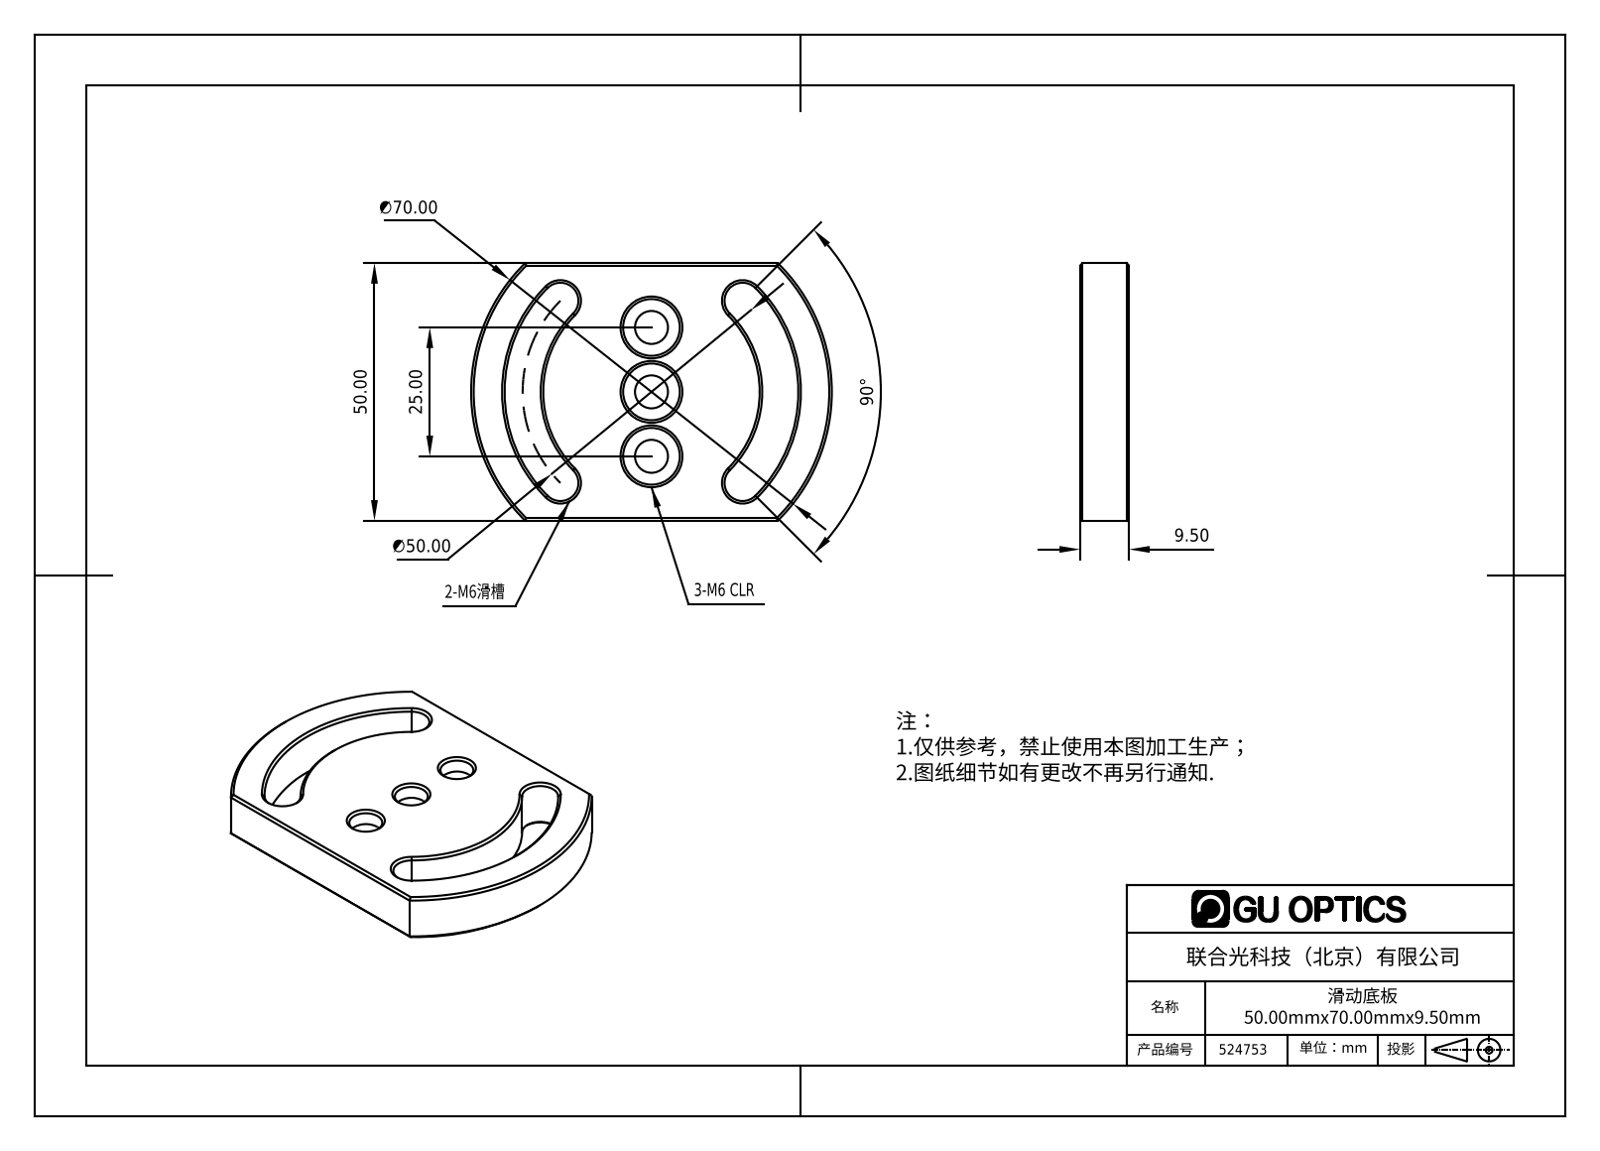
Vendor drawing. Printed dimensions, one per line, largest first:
90°
∅70.00
50.00
∅50.00
25.00
9.50
